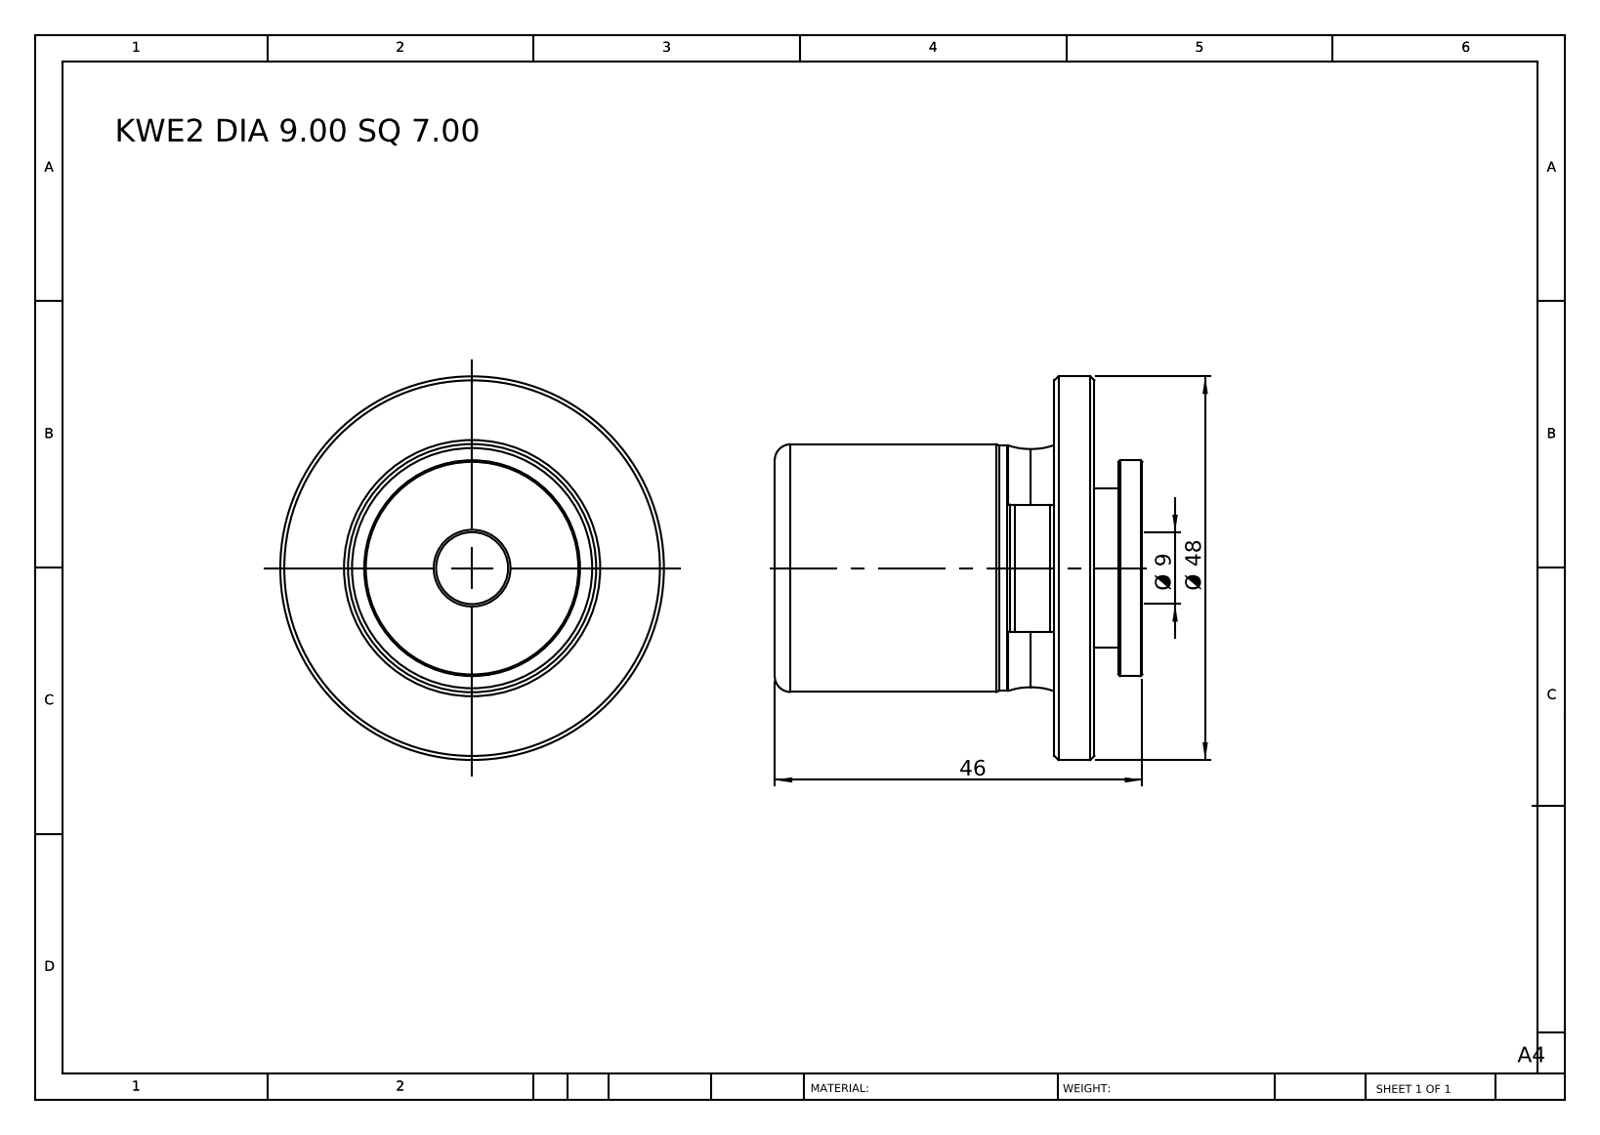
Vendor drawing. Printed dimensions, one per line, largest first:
Ø 48
46
Ø 9
